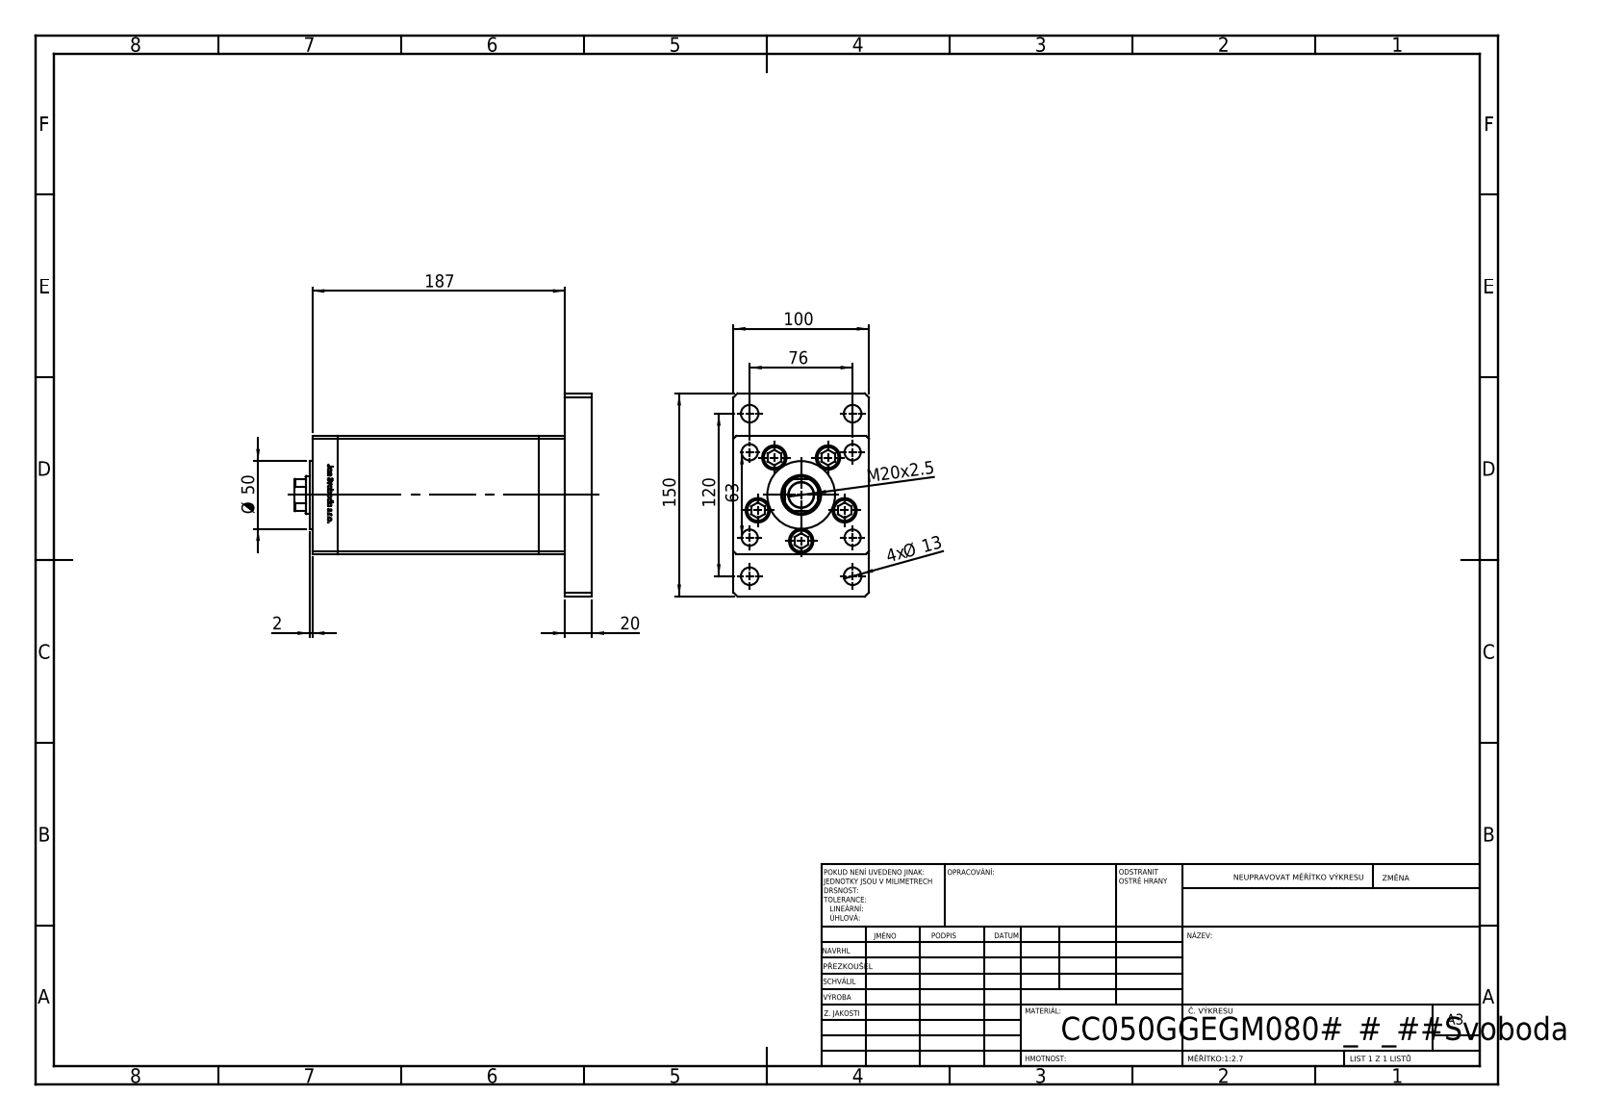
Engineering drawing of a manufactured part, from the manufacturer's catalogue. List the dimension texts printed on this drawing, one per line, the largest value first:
187
150
120
100
76
63
Ø 50
20
M20x2.5
4x Ø 13
2
